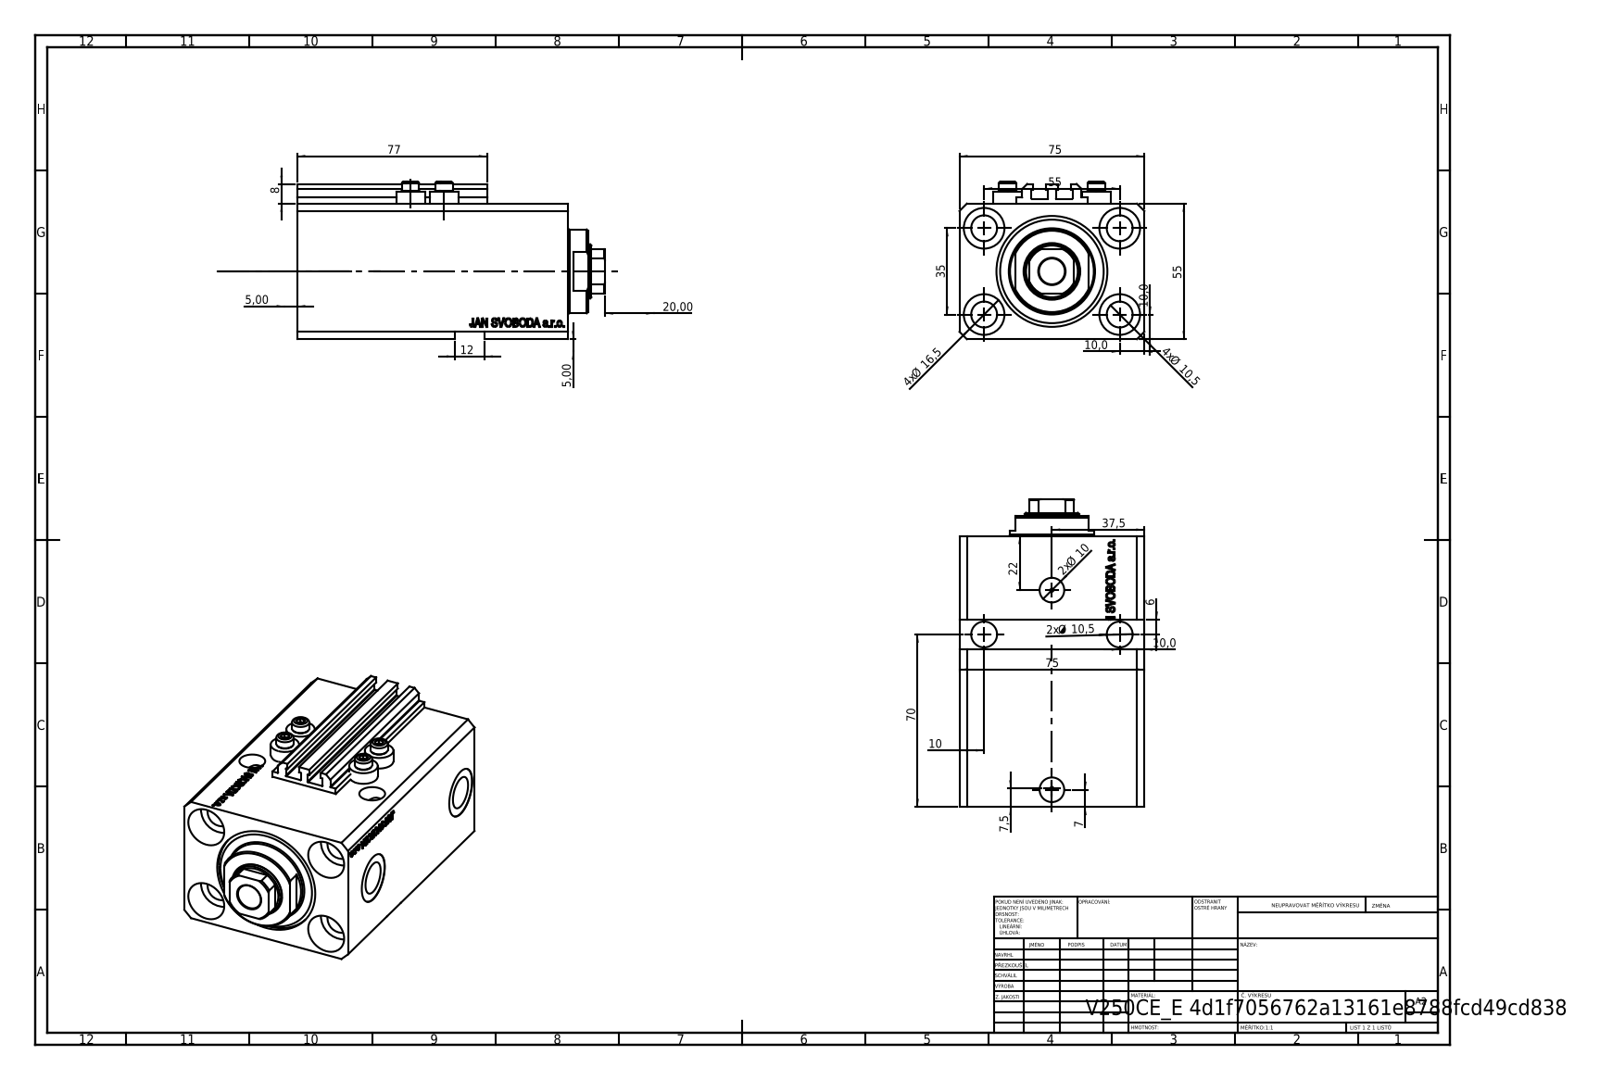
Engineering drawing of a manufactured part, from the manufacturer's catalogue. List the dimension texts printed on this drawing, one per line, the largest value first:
77
75
75
70
55
55
37,5
35
22
20,00
4x Ø 16,5
12
4x Ø 10,5
2x Ø 10,5
10,0
10,0
2x Ø 10
10,0
10
8
7,5
7
6
5,00
5,00
